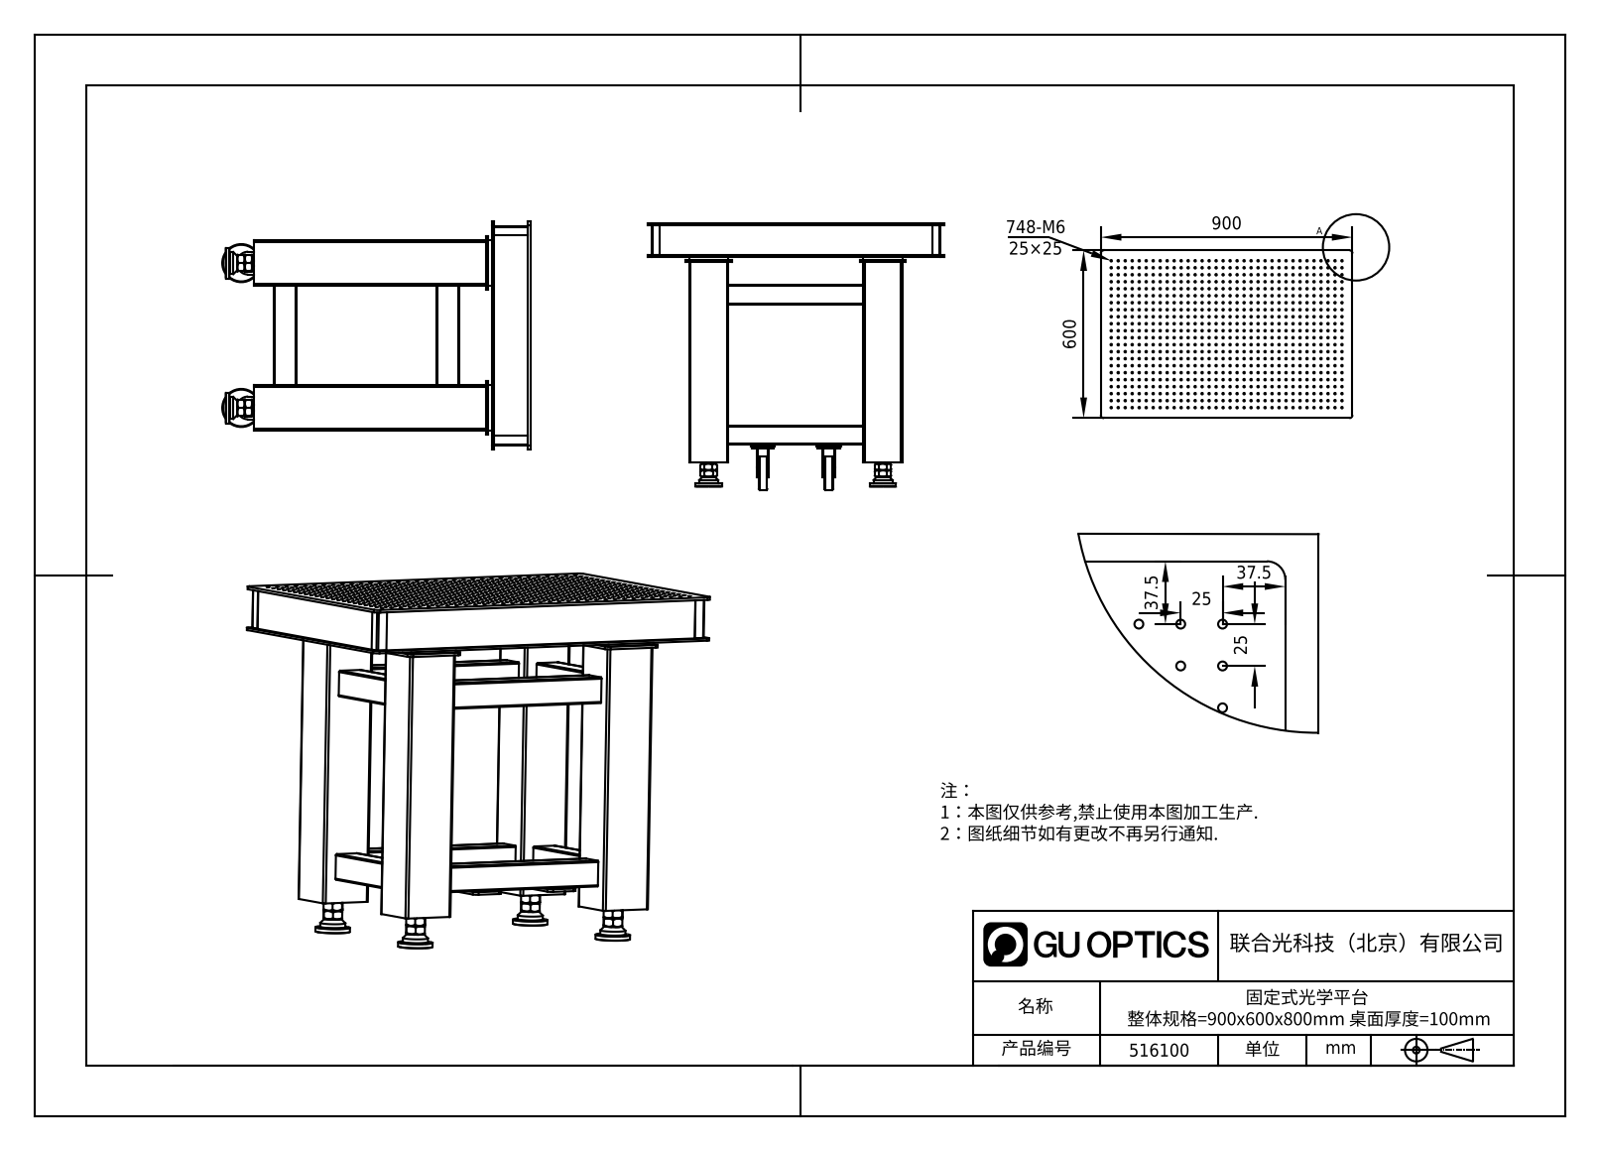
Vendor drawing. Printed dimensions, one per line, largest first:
900
600
37.5
37.5
25
25
